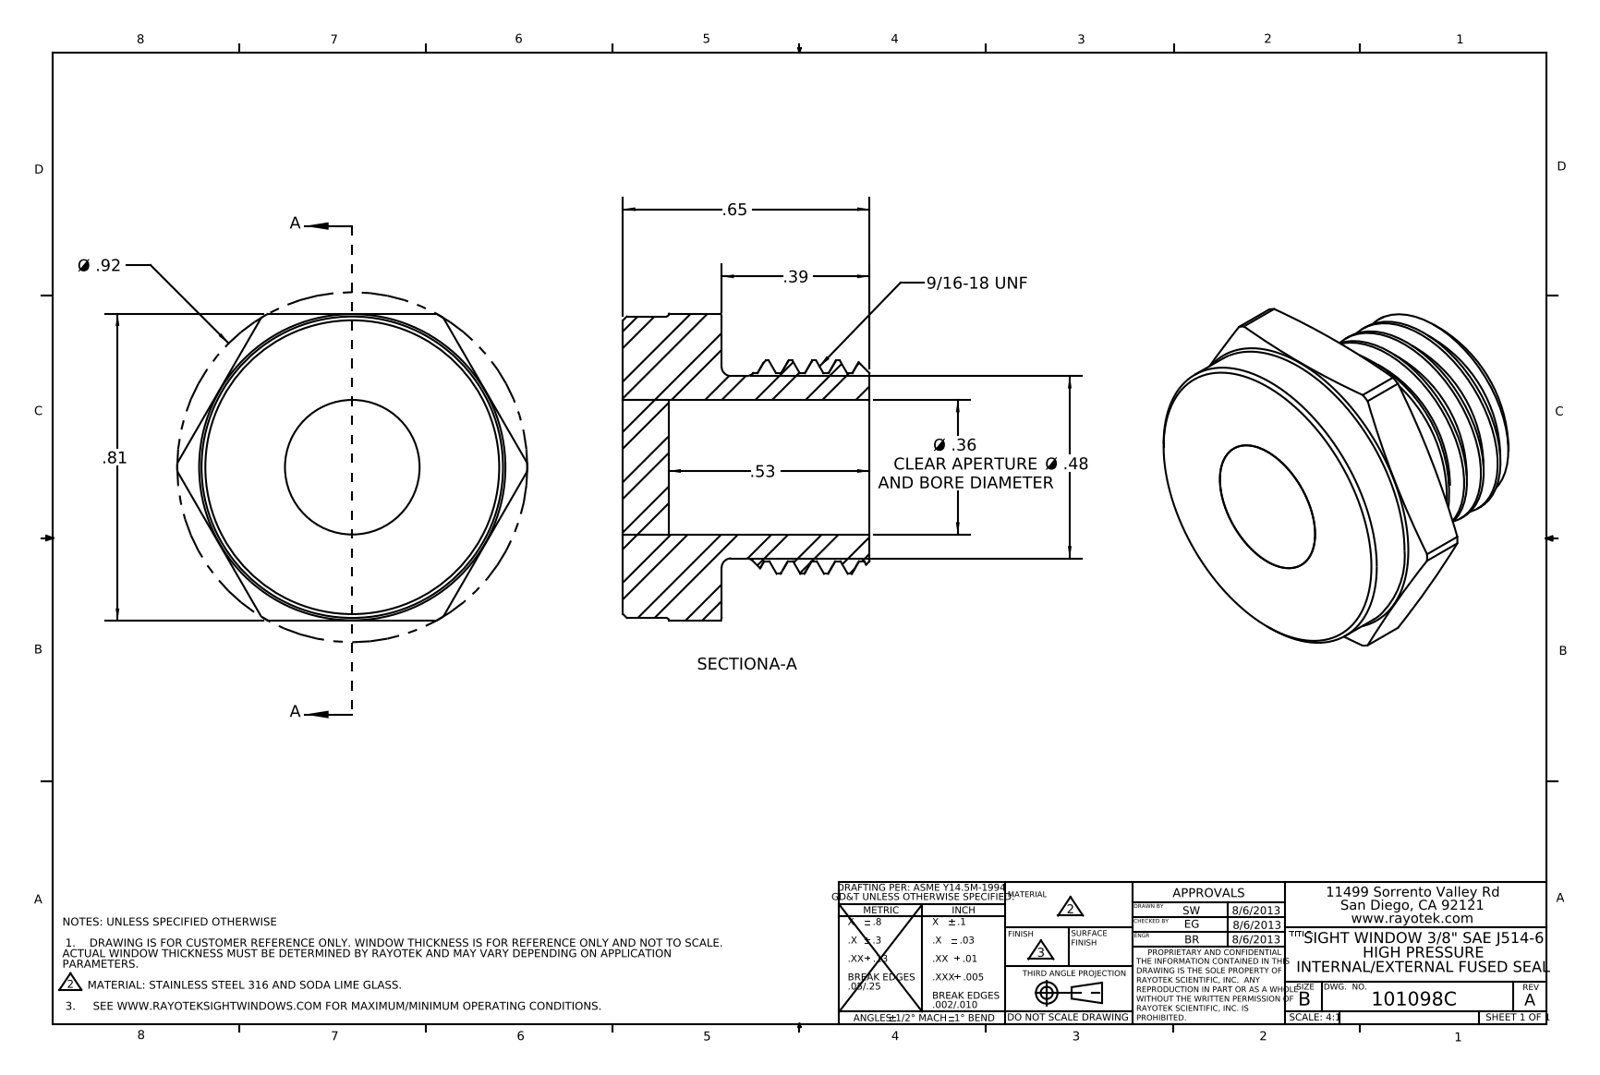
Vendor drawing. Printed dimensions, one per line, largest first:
Ø .92
.81
.65
.53
Ø .48
.39
Ø .36 CLEAR APERTURE AND BORE DIAMETER
